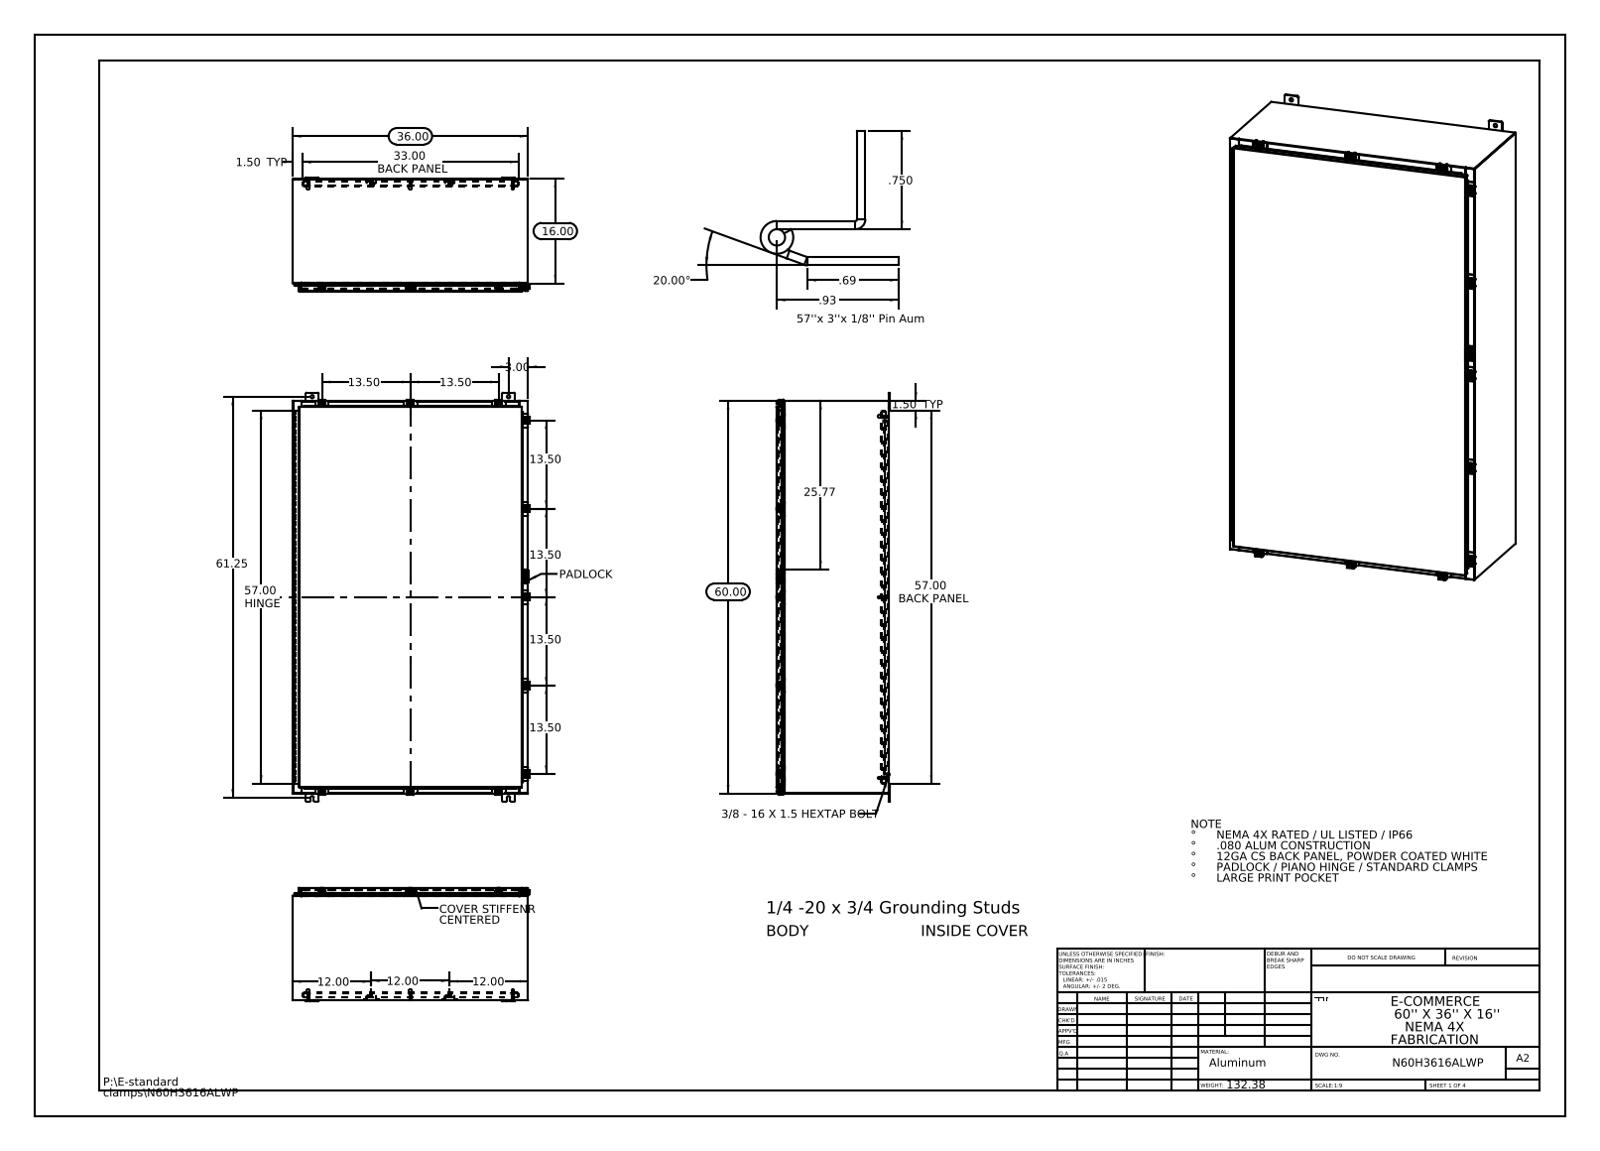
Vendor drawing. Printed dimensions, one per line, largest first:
61.25
60.00
57.00 HINGE
57.00 BACK PANEL
36.00
33.00 BACK PANEL
25.77
20.00°
16.00
13.50
13.50
13.50
13.50
13.50
13.50
12.00
12.00
12.00
3.00
1.50 TYP
1.50 TYP
.93
.750
.69
